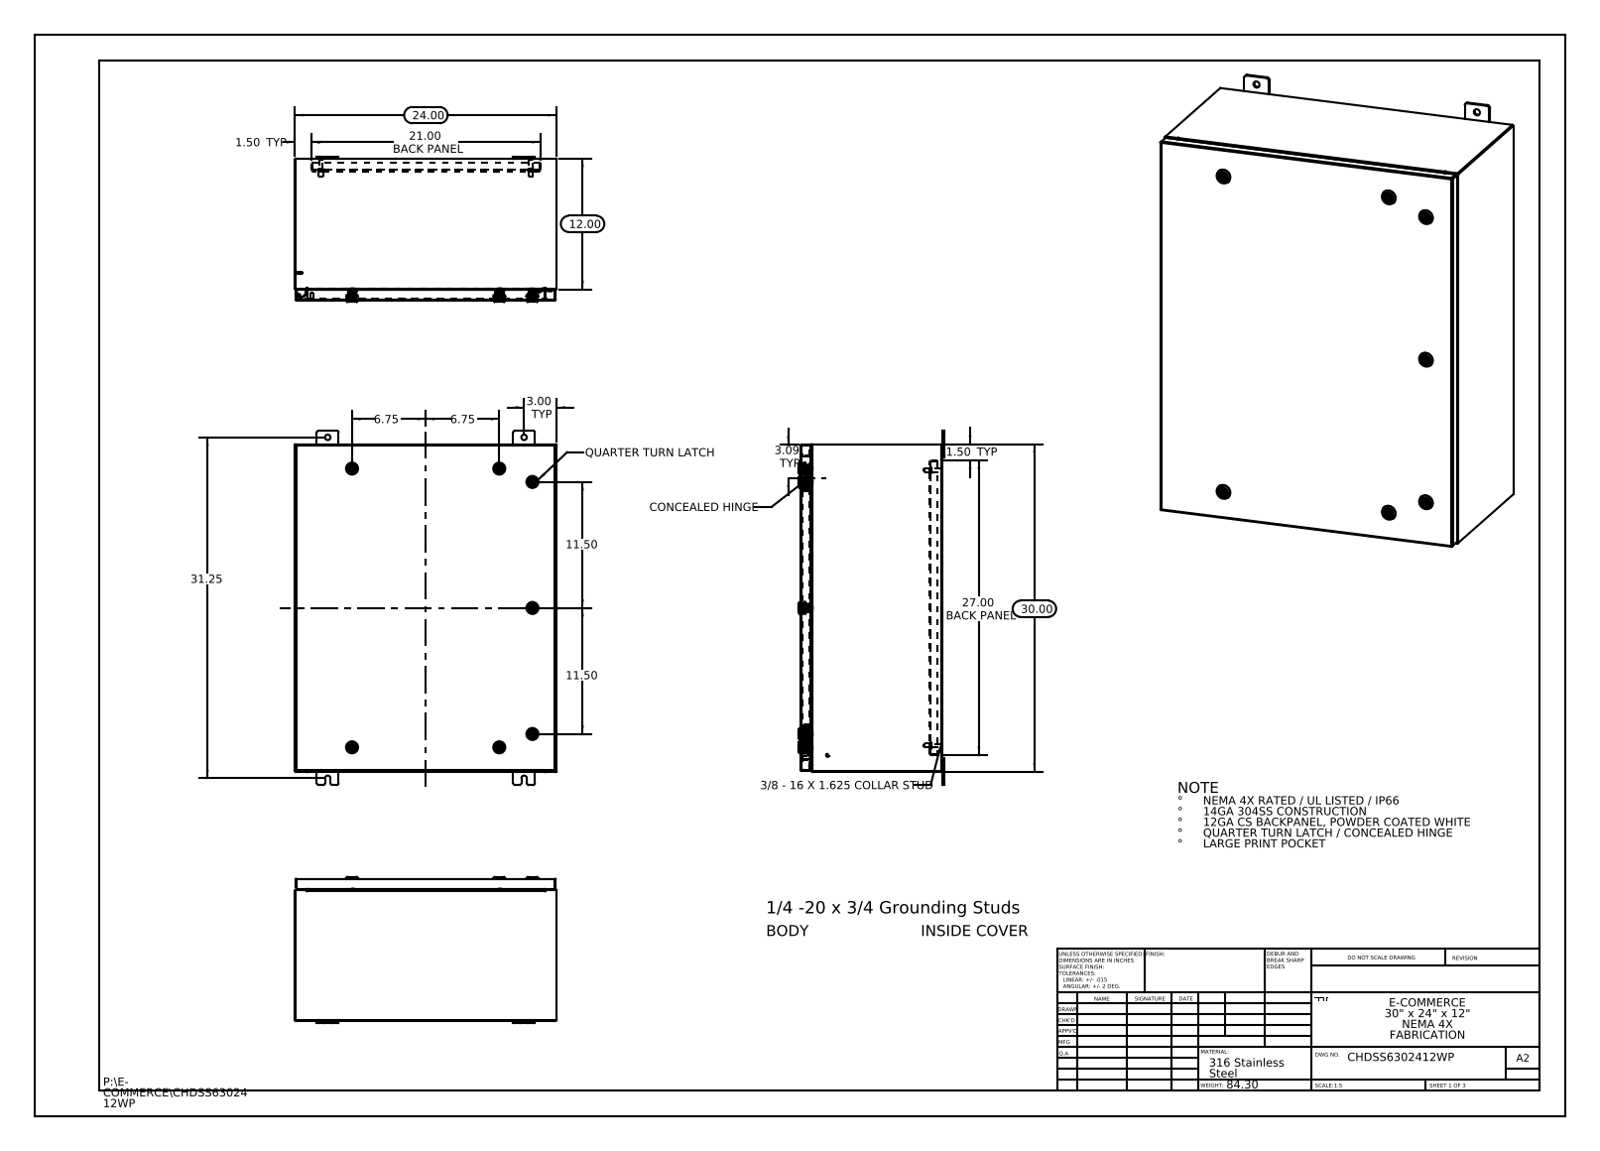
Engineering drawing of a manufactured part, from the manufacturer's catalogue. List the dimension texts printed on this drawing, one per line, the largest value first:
31.25
30.00
27.00 BACK PANEL
24.00
21.00 BACK PANEL
12.00
11.50
11.50
6.75
6.75
3.09 TYP
3.00 TYP
1.50 TYP
1.50 TYP
